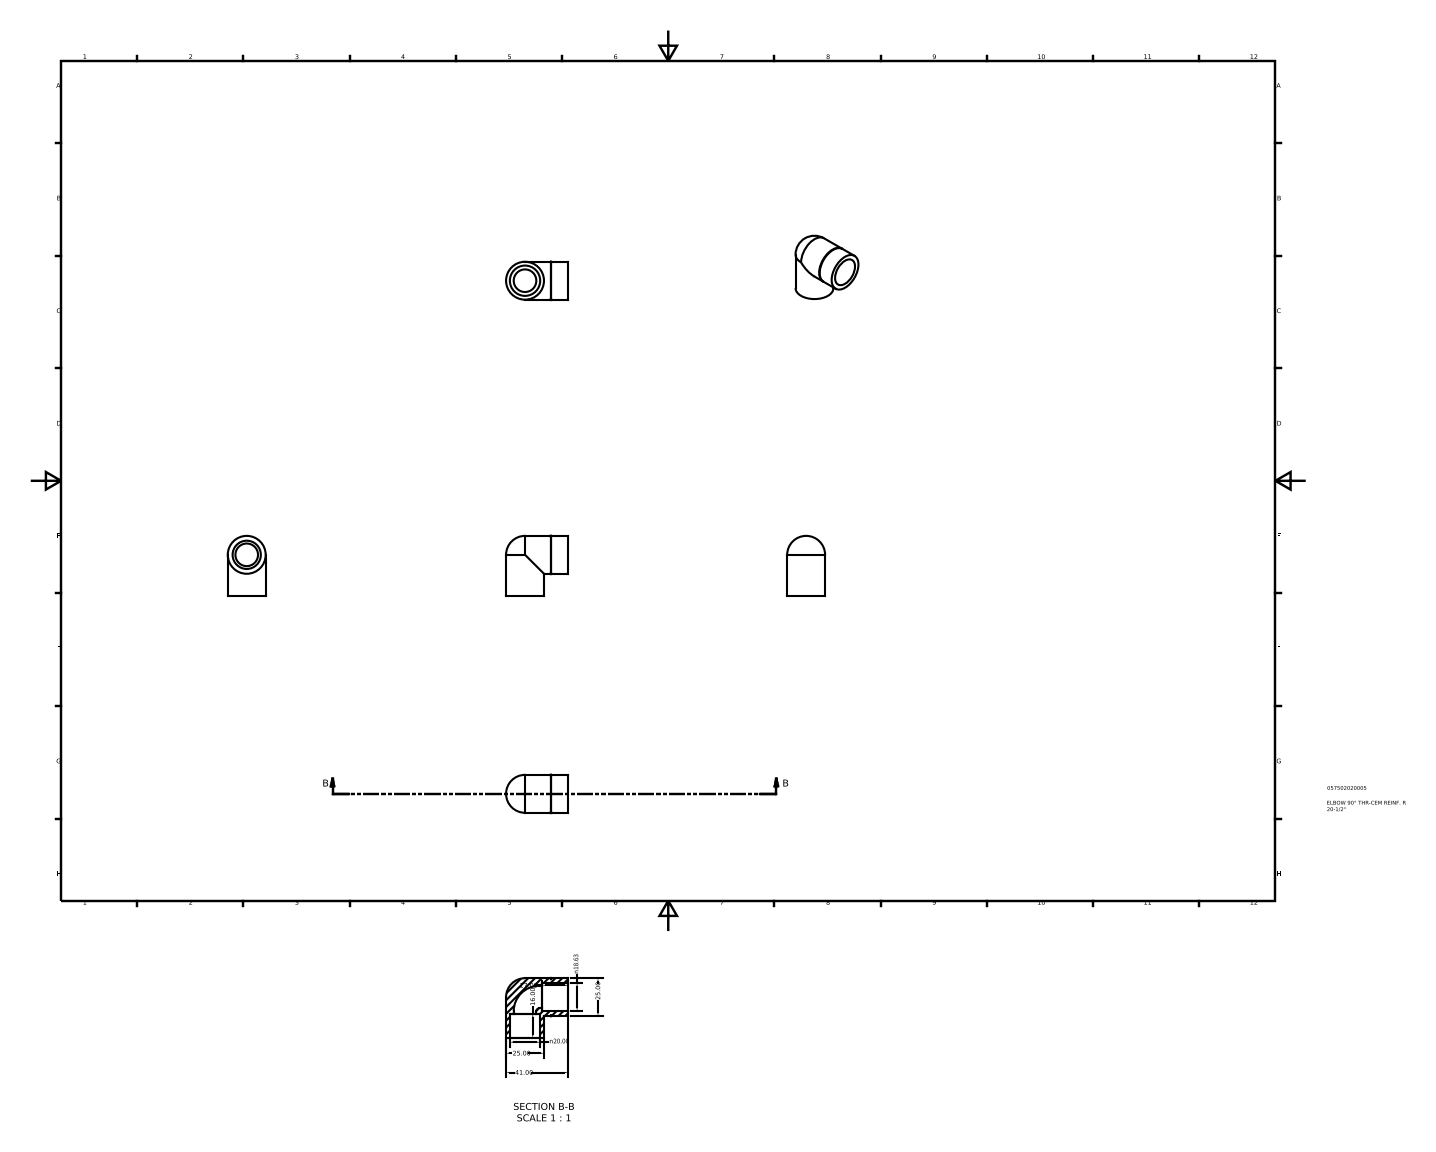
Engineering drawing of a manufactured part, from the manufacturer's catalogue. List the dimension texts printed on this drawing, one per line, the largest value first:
41.00
25.00
25.00
n20.00
n18.63
17.00
16.00
